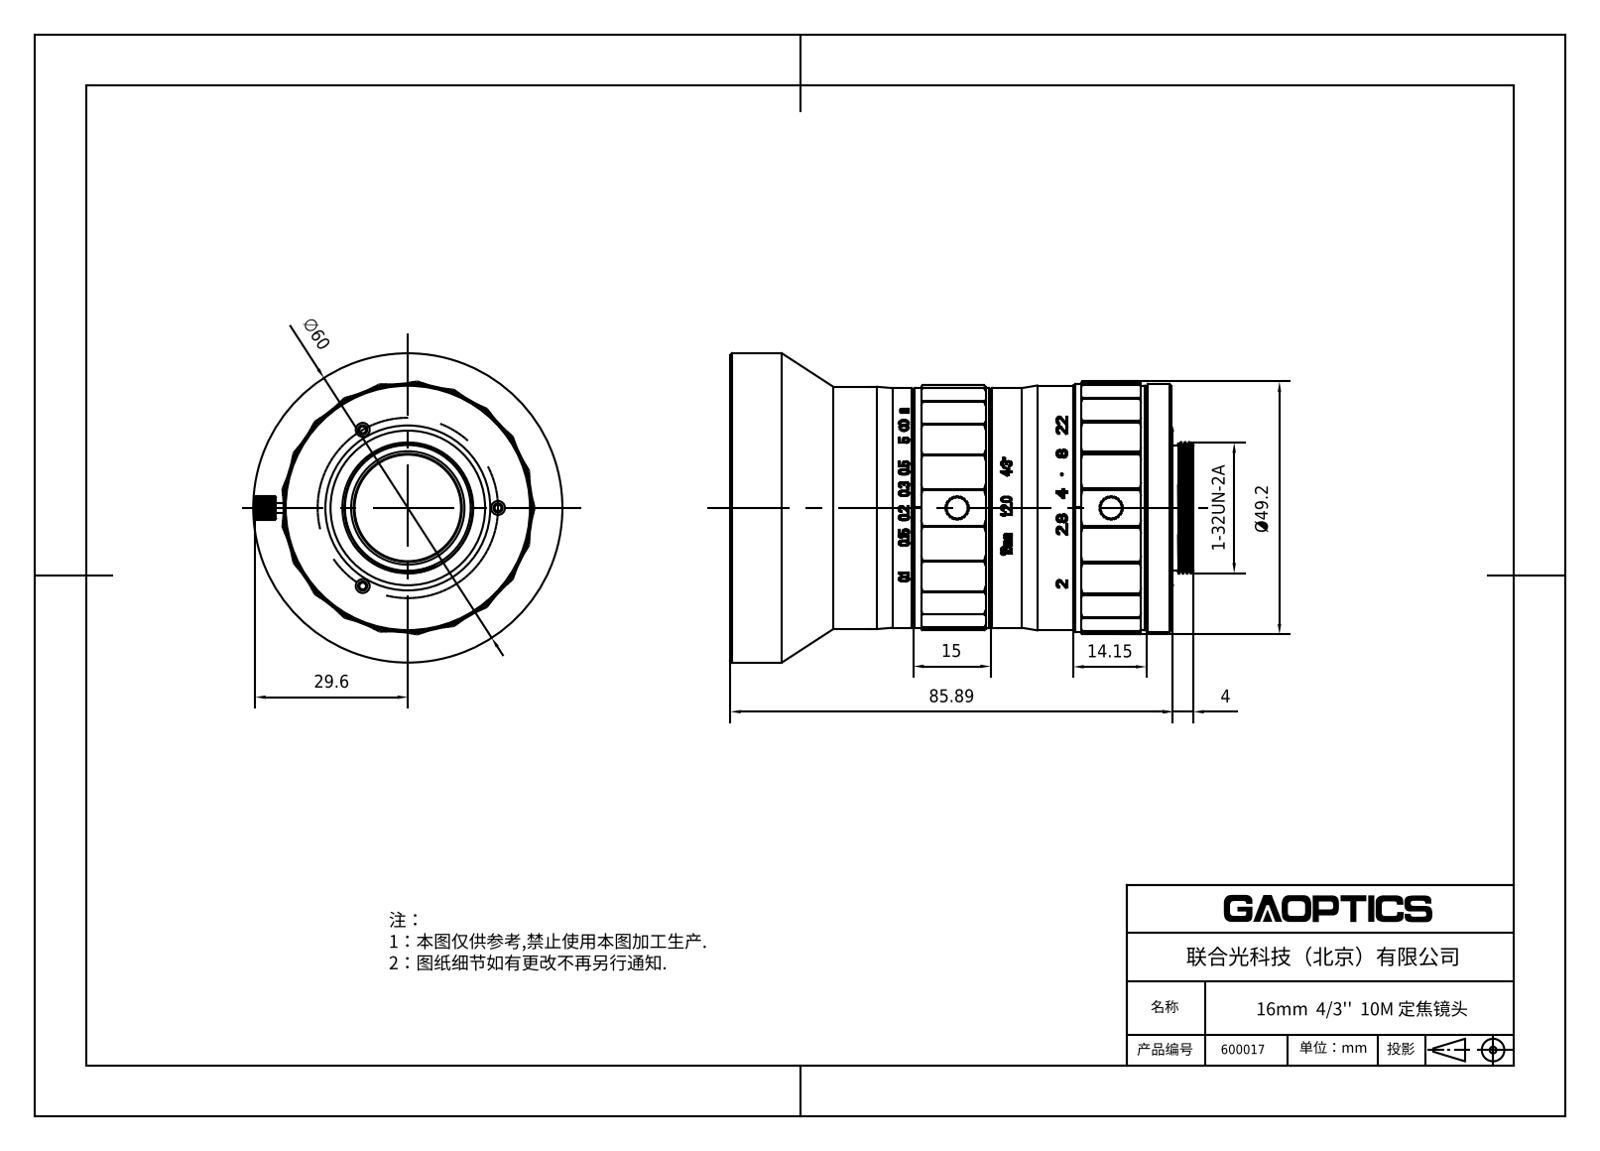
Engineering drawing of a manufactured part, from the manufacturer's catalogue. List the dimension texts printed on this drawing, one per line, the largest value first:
85.89
∅60
Ø49.2
29.6
15
14.15
4
1-32UN-2A
